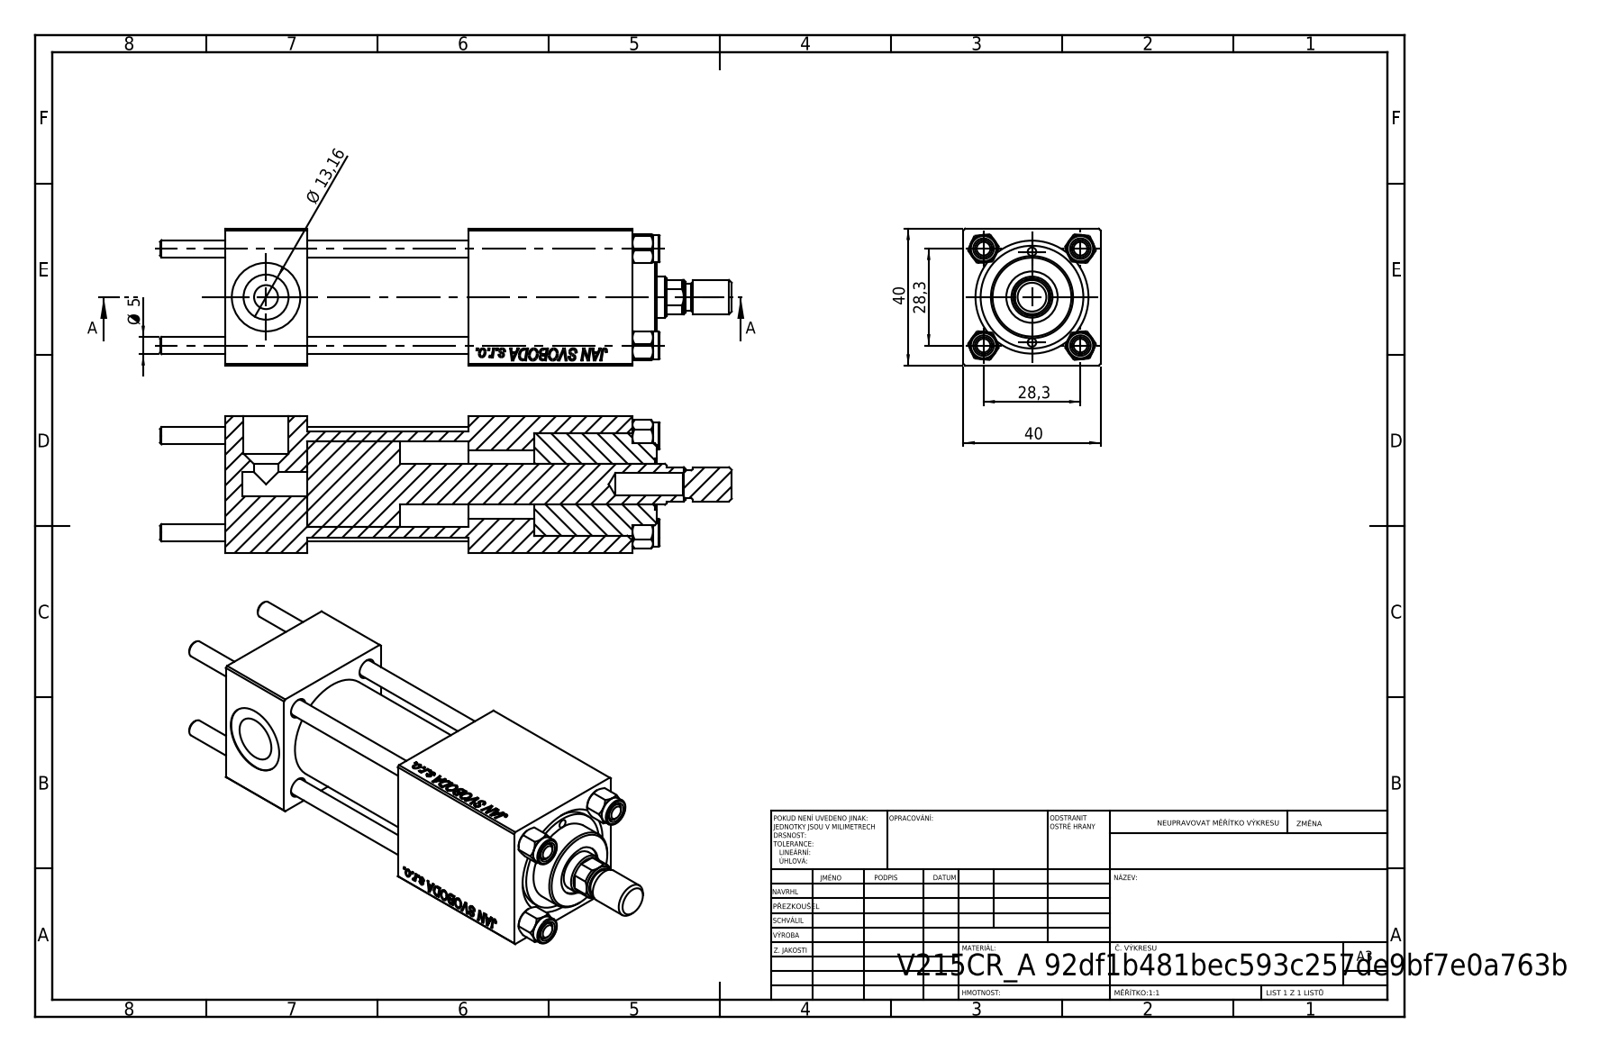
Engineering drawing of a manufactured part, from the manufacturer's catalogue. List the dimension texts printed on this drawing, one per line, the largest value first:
40
40
28,3
28,3
Ø 13,16
Ø 5
